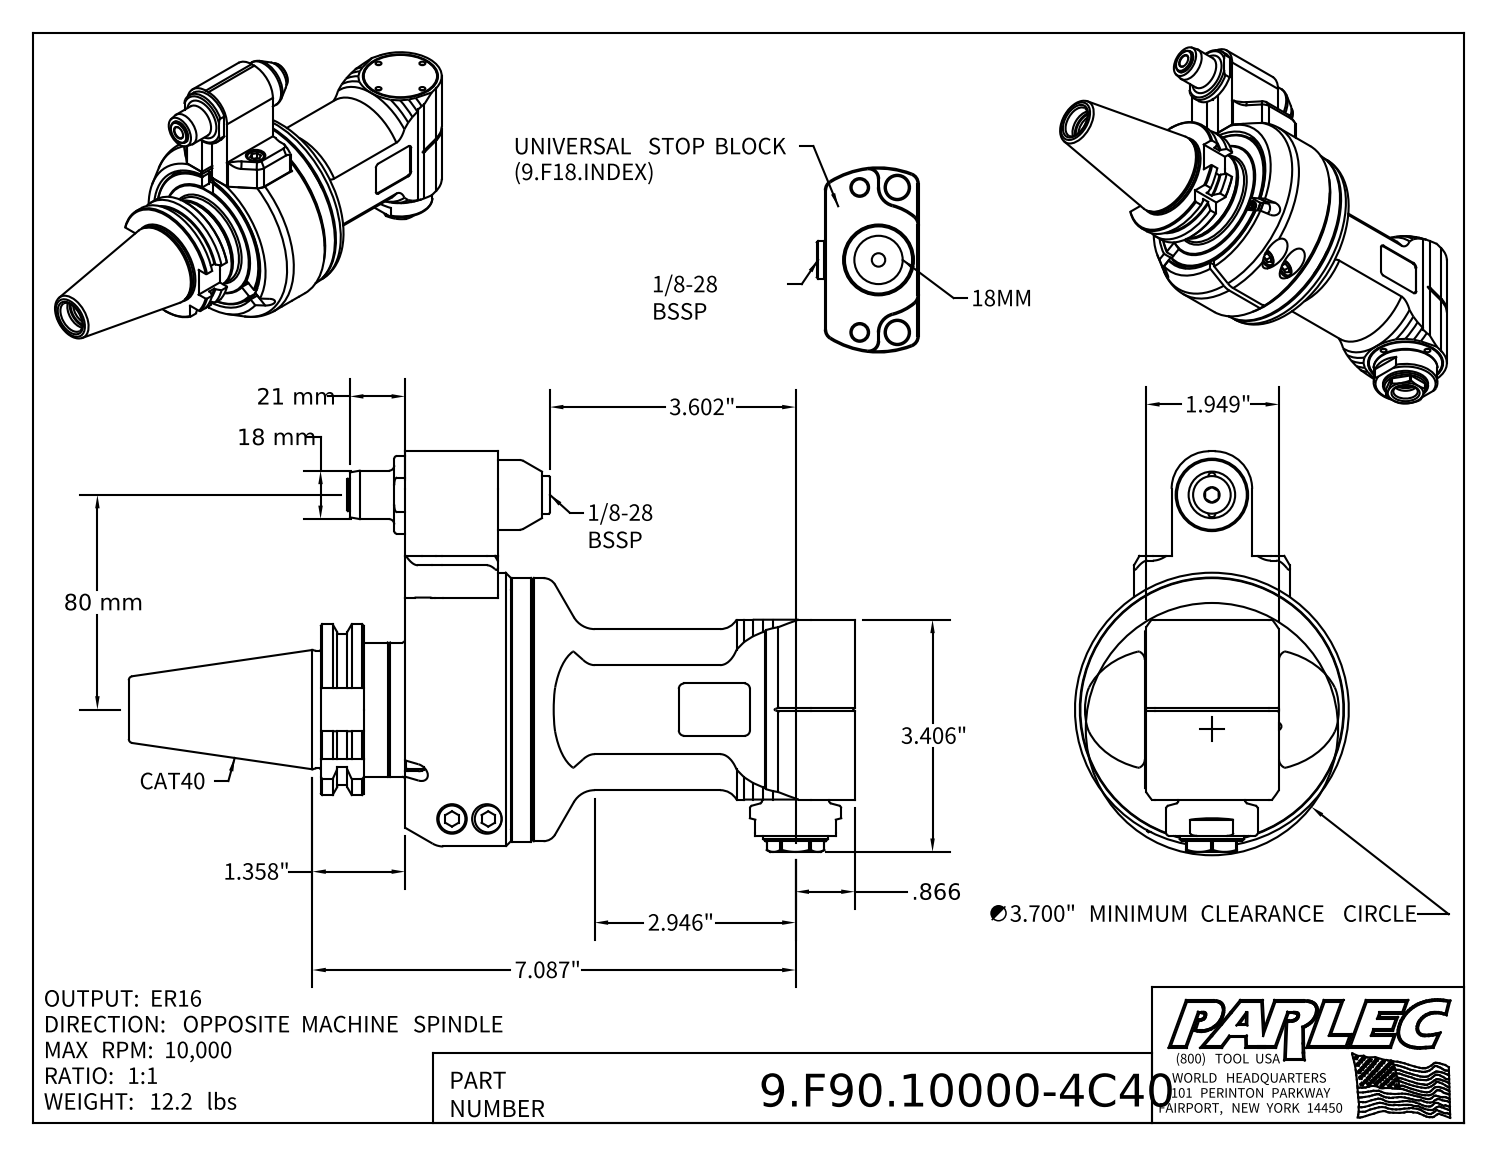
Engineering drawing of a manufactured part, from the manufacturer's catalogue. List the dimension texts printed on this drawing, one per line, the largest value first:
80 mm
21 mm
18 mm
7.087"
∅3.700" MINIMUM CLEARANCE CIRCLE
3.602"
3.406"
2.946"
1.949"
1.358"
.866
